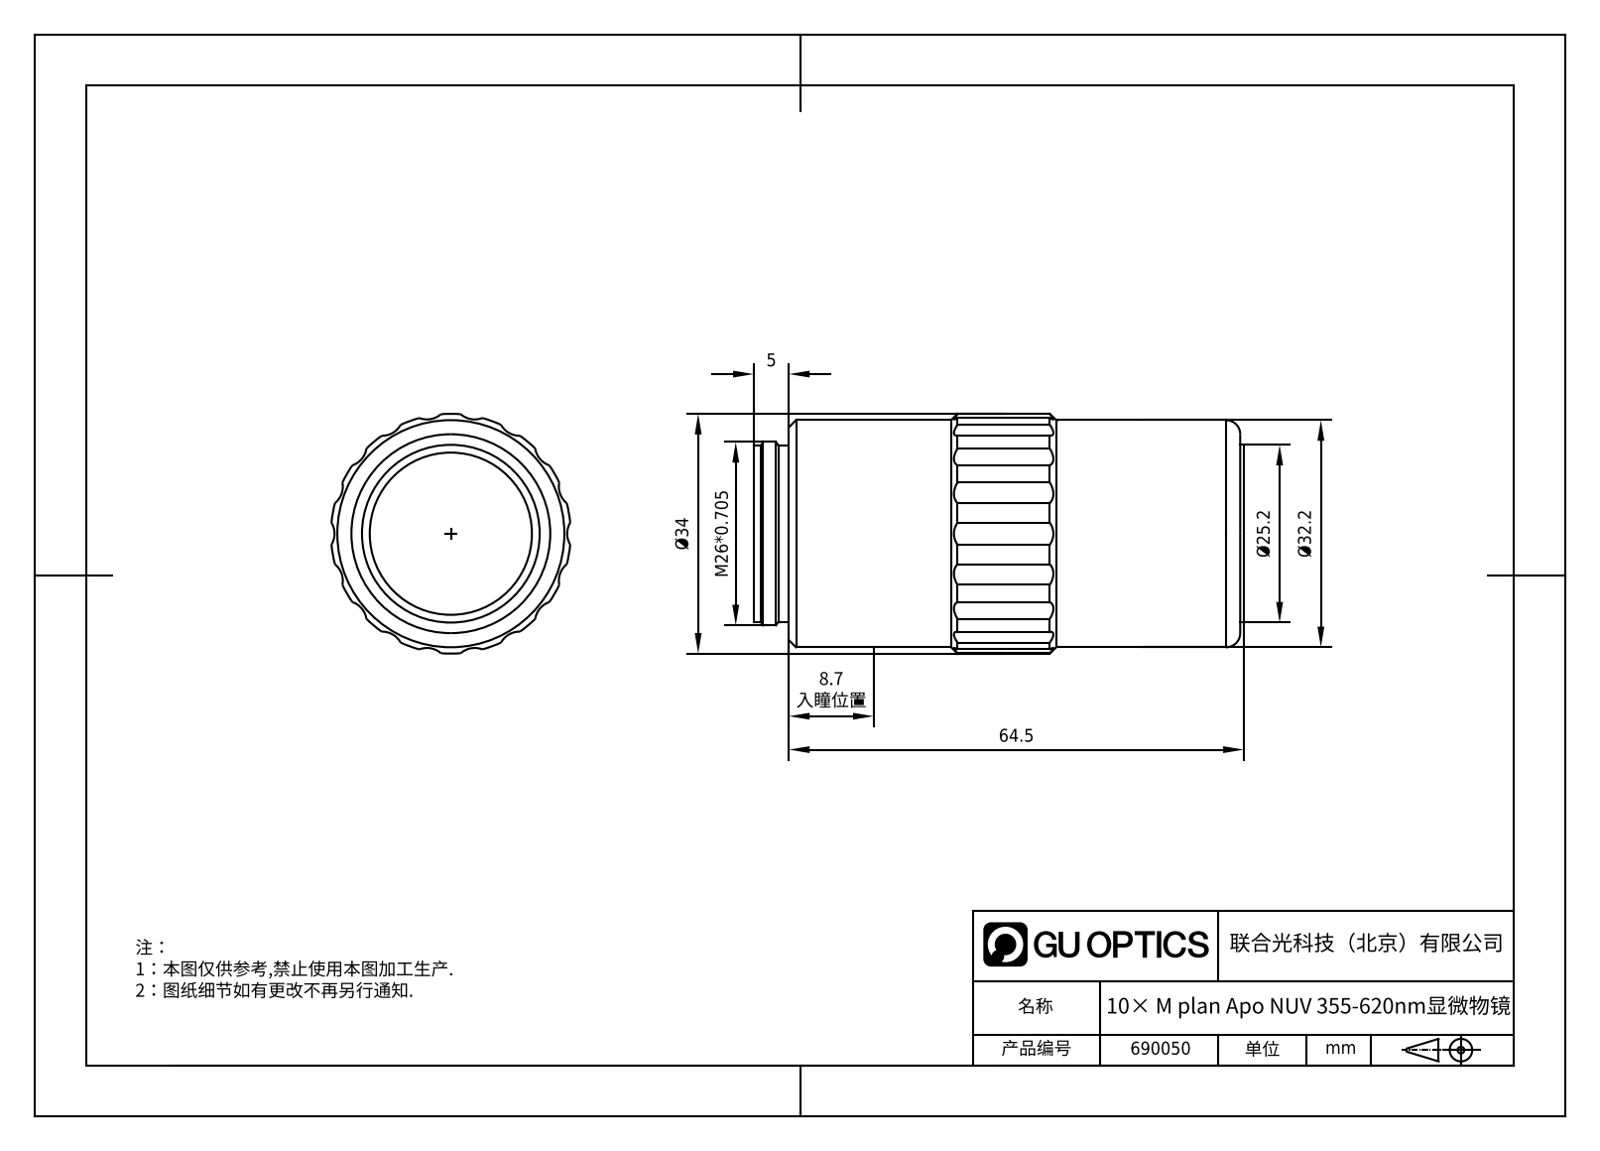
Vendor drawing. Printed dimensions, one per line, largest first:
64.5
Ø34
Ø32.2
M26*0.705
Ø25.2
8.7 入瞳位置
5
